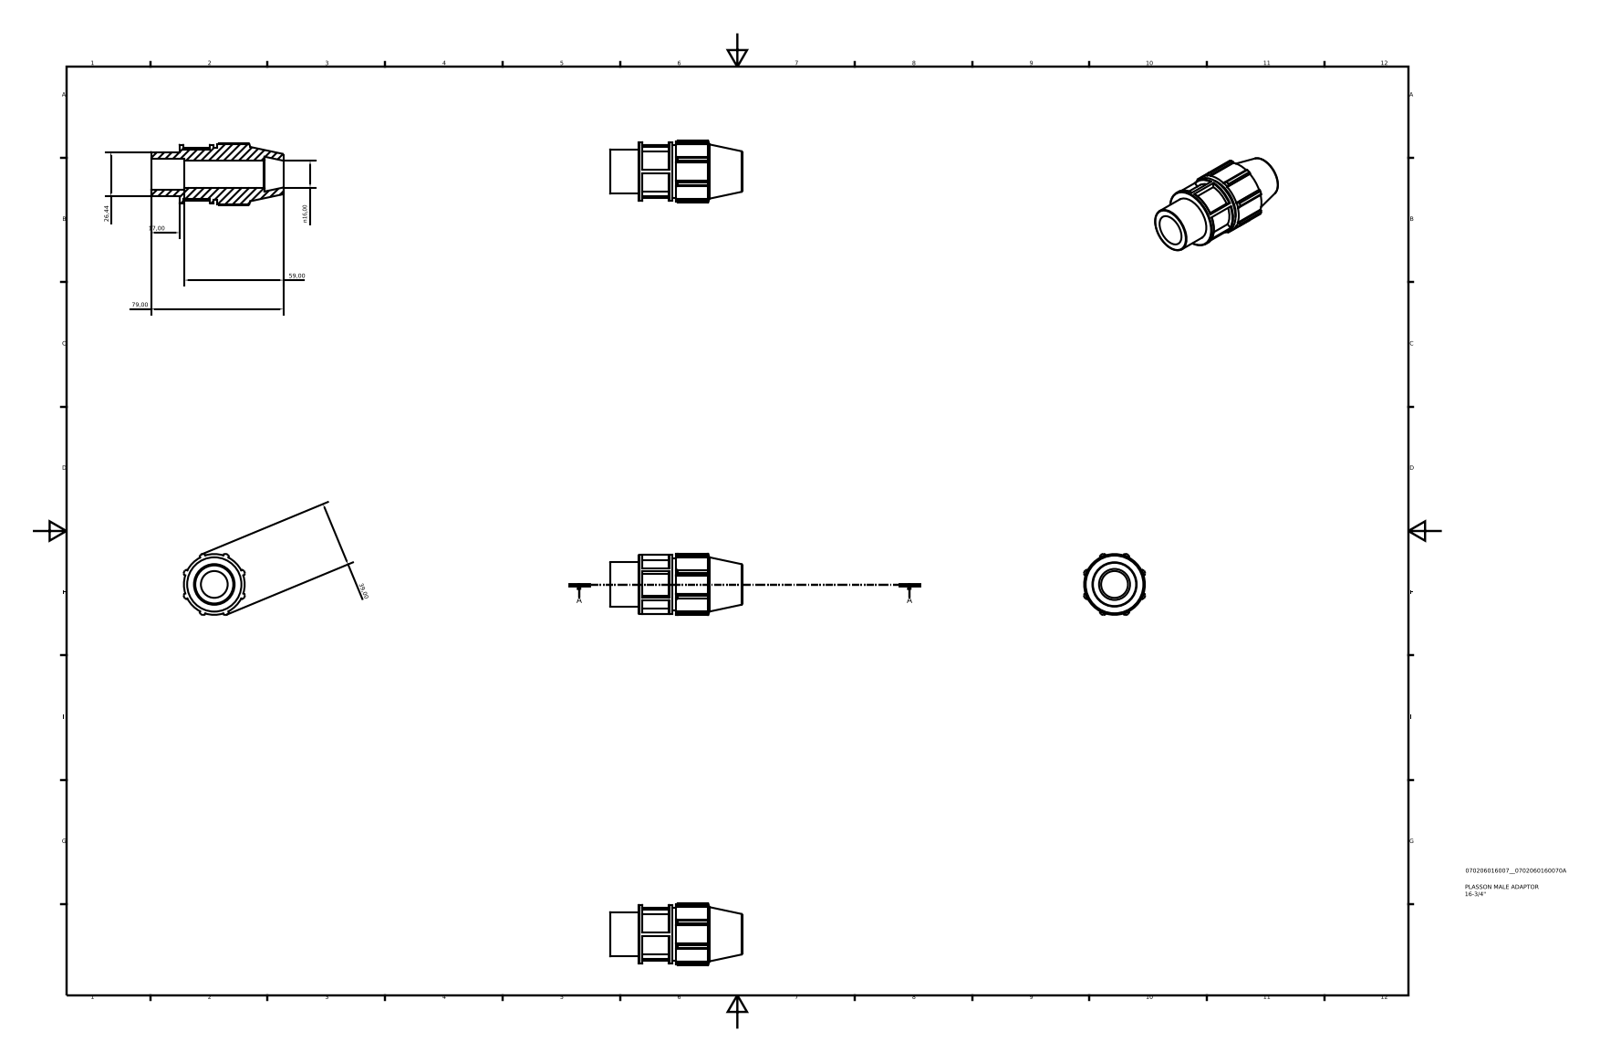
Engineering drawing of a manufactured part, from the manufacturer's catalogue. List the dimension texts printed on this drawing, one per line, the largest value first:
79,00
59,00
39,00
26,44
17,00
n16,00
